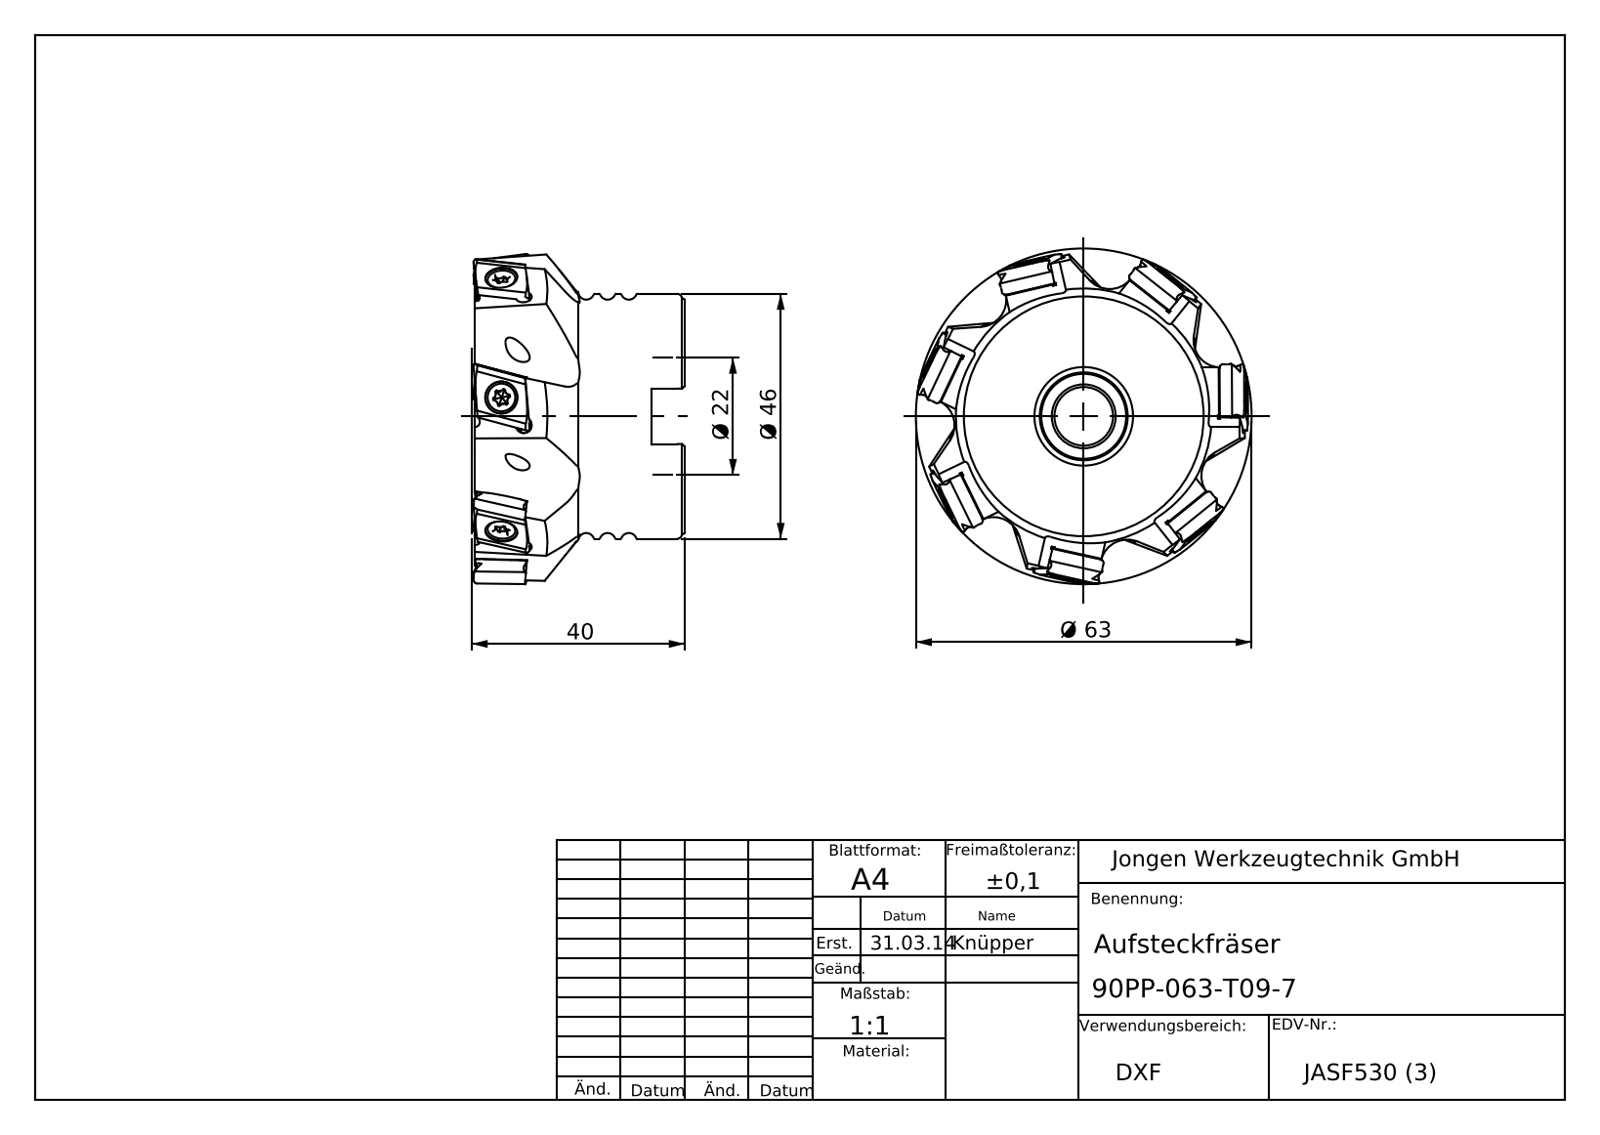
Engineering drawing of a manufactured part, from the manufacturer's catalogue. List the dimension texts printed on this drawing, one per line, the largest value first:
Ø 63
Ø 46
40
Ø 22
